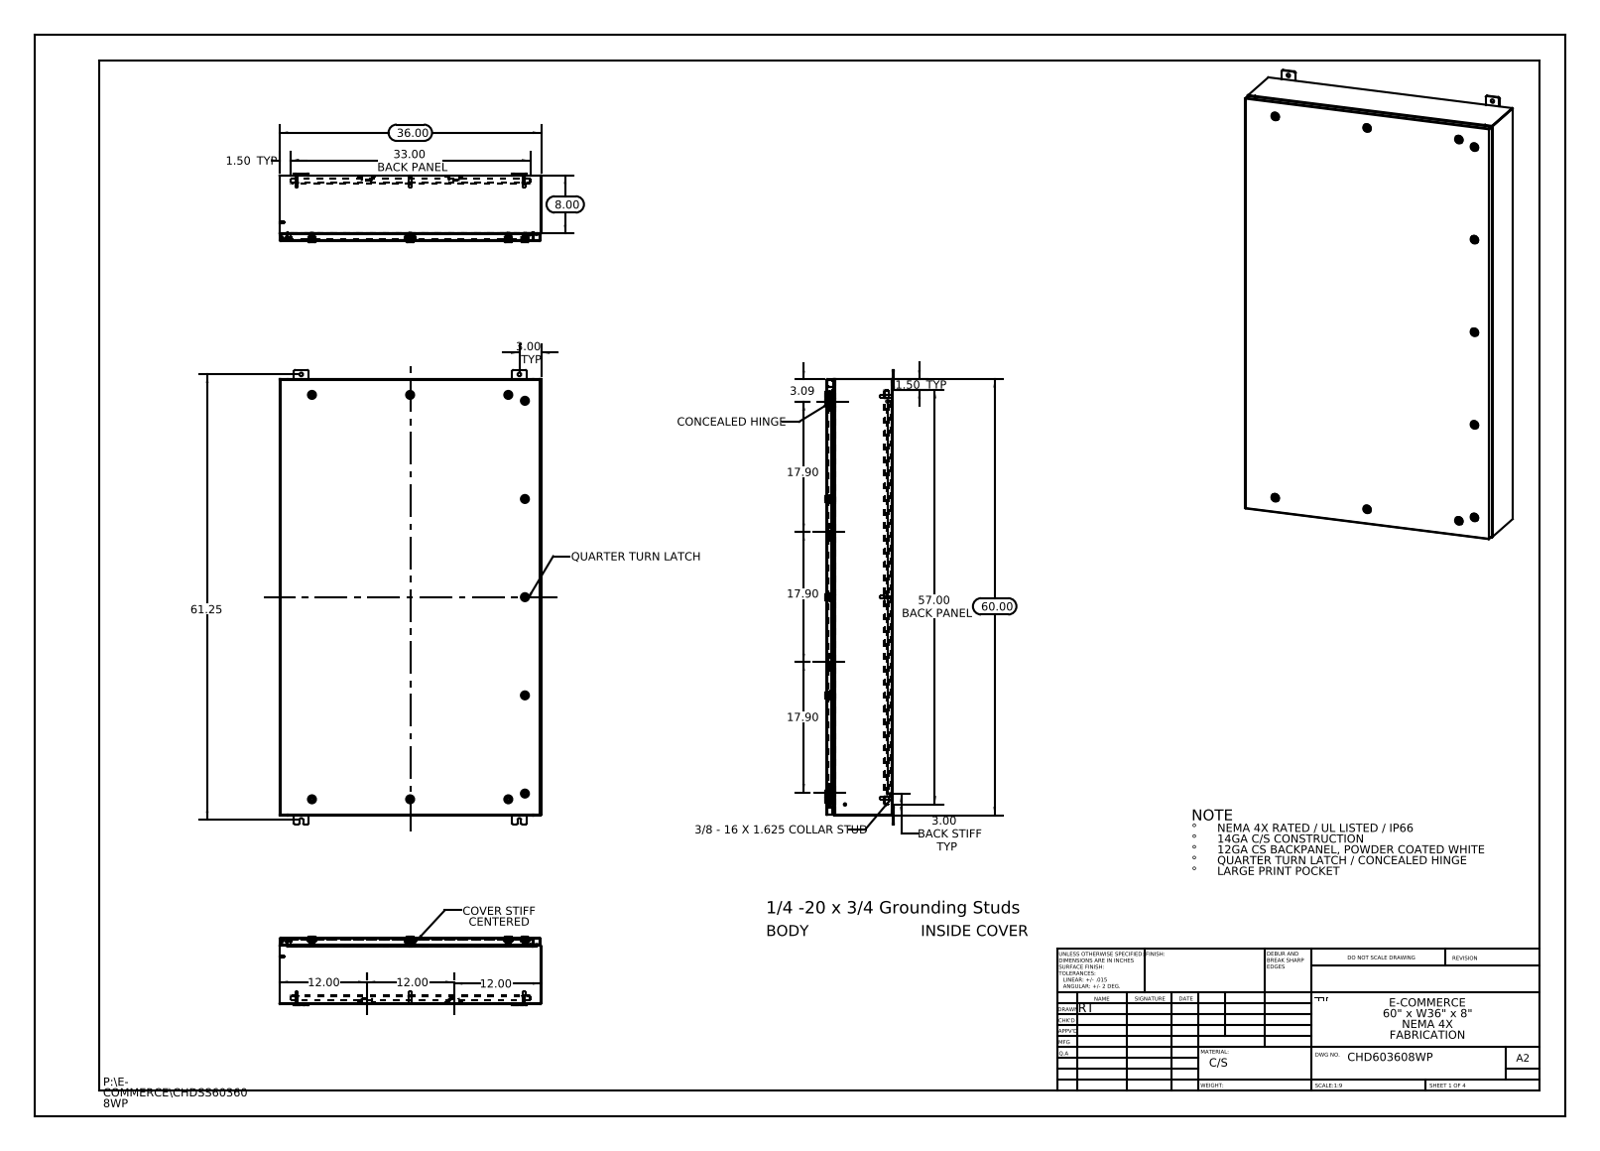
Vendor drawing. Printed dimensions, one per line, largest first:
61.25
60.00
57.00 BACK PANEL
36.00
33.00 BACK PANEL
17.90
17.90
17.90
12.00
12.00
12.00
8.00
3.09
3.00 TYP
3.00 BACK STIFF TYP
1.50 TYP
1.50 TYP
